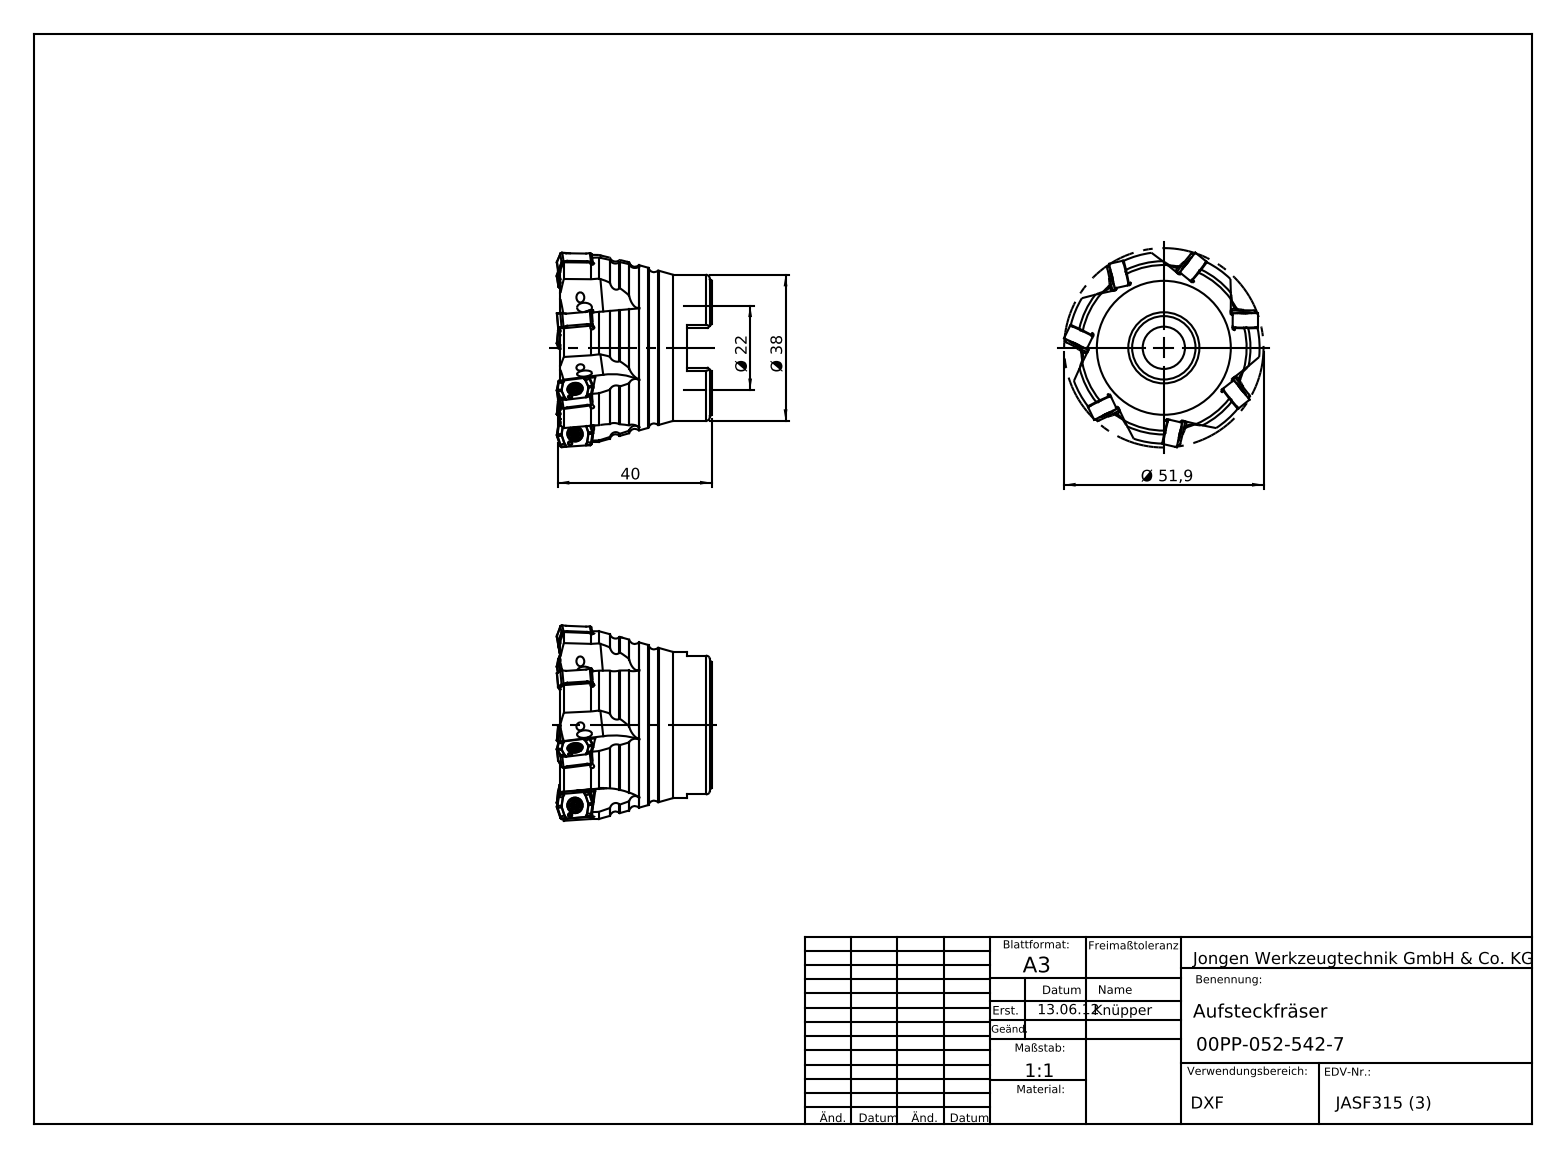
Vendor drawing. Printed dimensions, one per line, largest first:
Ø 51,9
40
Ø 38
Ø 22
